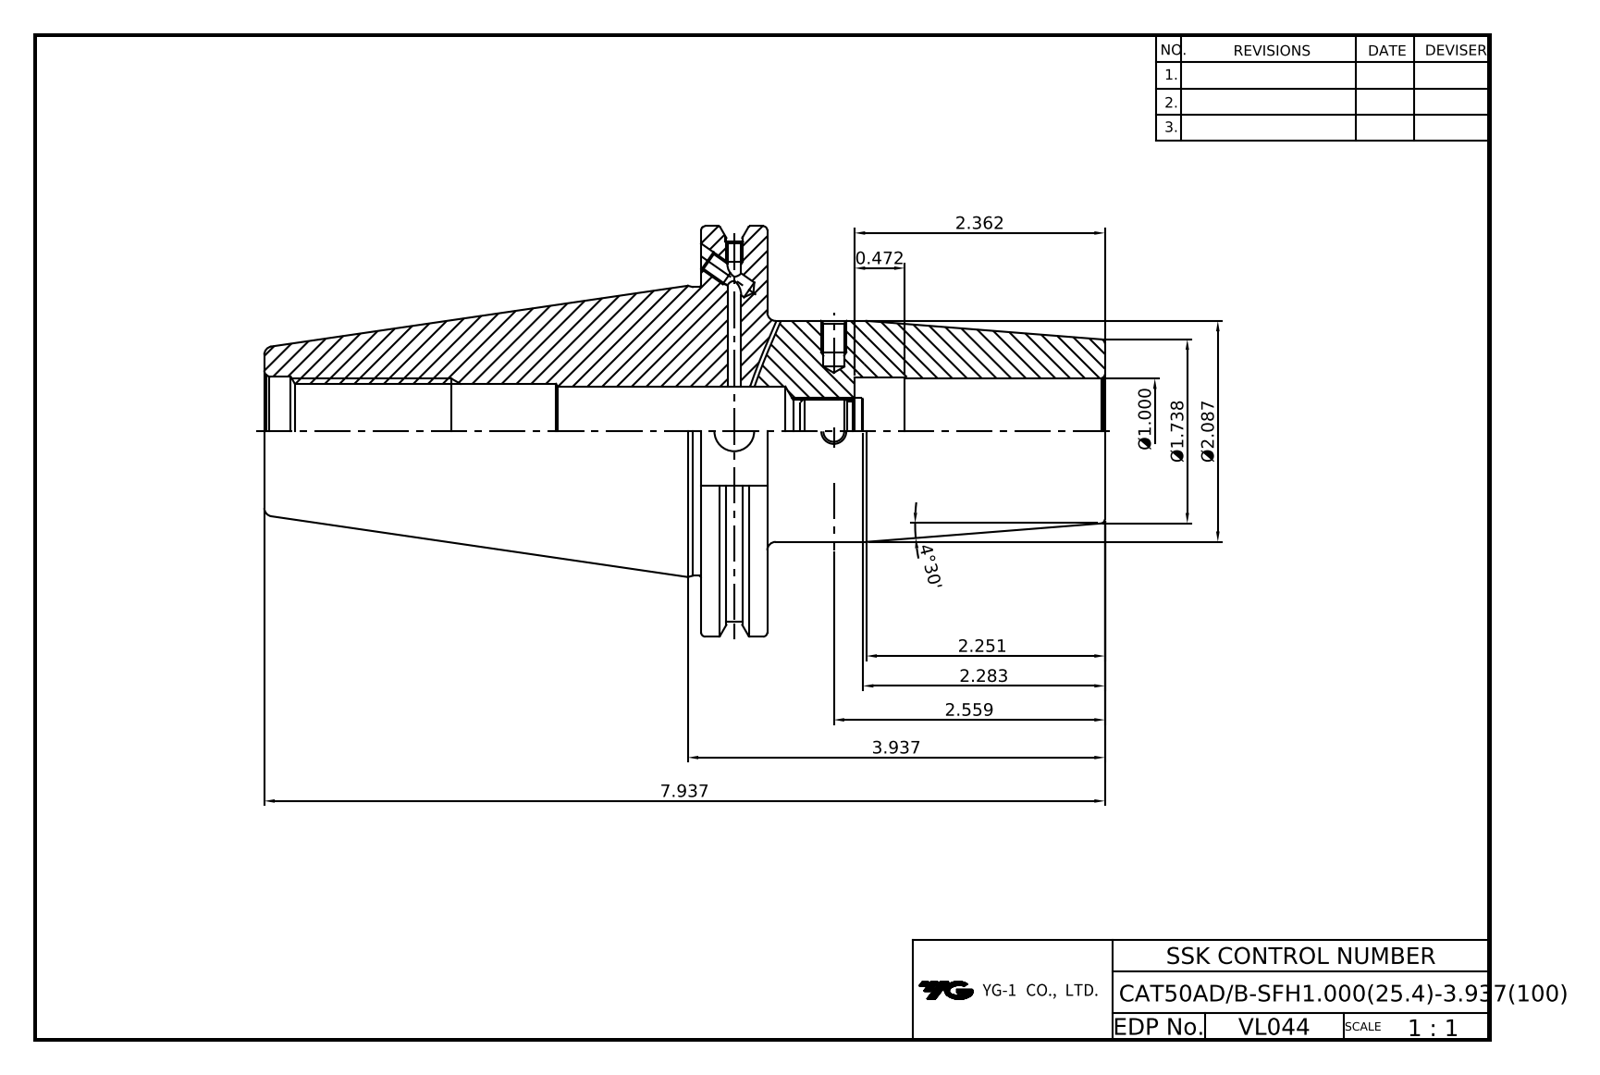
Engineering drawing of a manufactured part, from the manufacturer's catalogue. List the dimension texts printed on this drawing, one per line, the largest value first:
7.937
4°30'
3.937
2.559
2.362
2.283
2.251
Ø2.087
Ø1.738
Ø1.000
0.472
